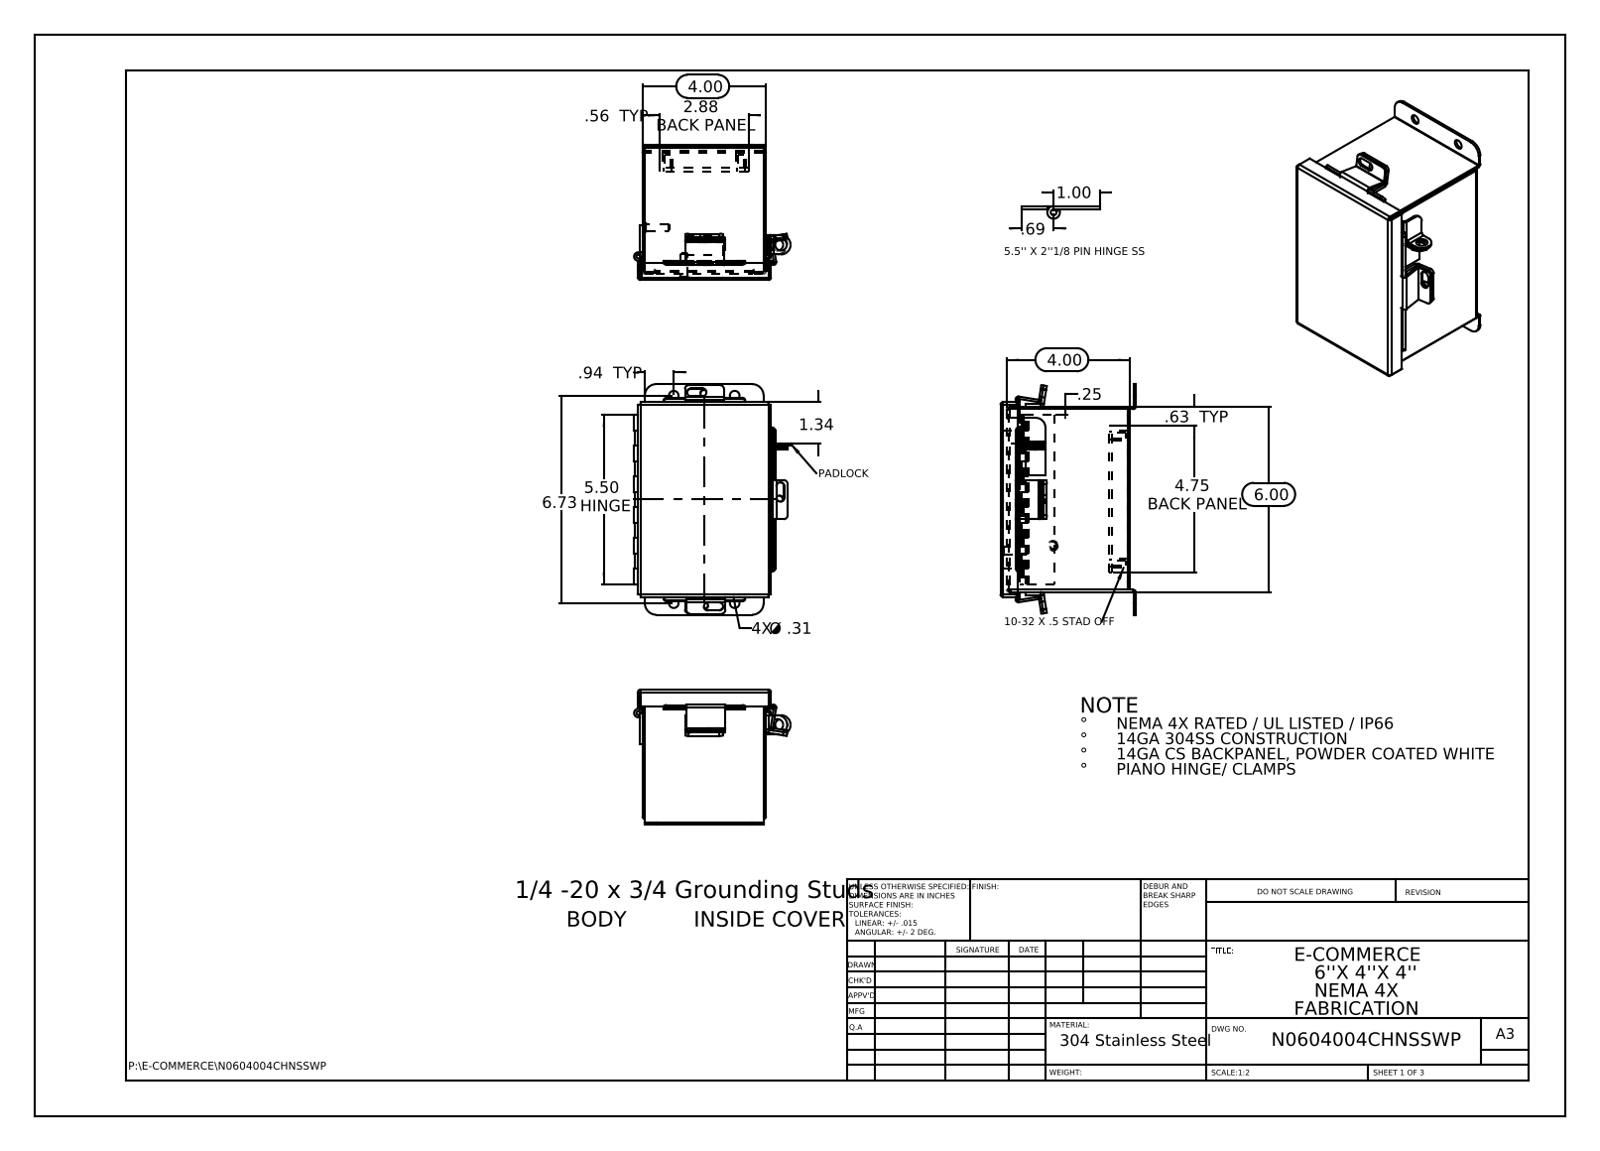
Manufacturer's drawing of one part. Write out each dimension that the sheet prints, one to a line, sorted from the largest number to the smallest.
6.73
6.00
5.50 HINGE
4.75 BACK PANEL
4.00
4.00
2.88 BACK PANEL
1.34
1.00
.94 TYP
.69
.63 TYP
.56 TYP
4X Ø .31
.25
